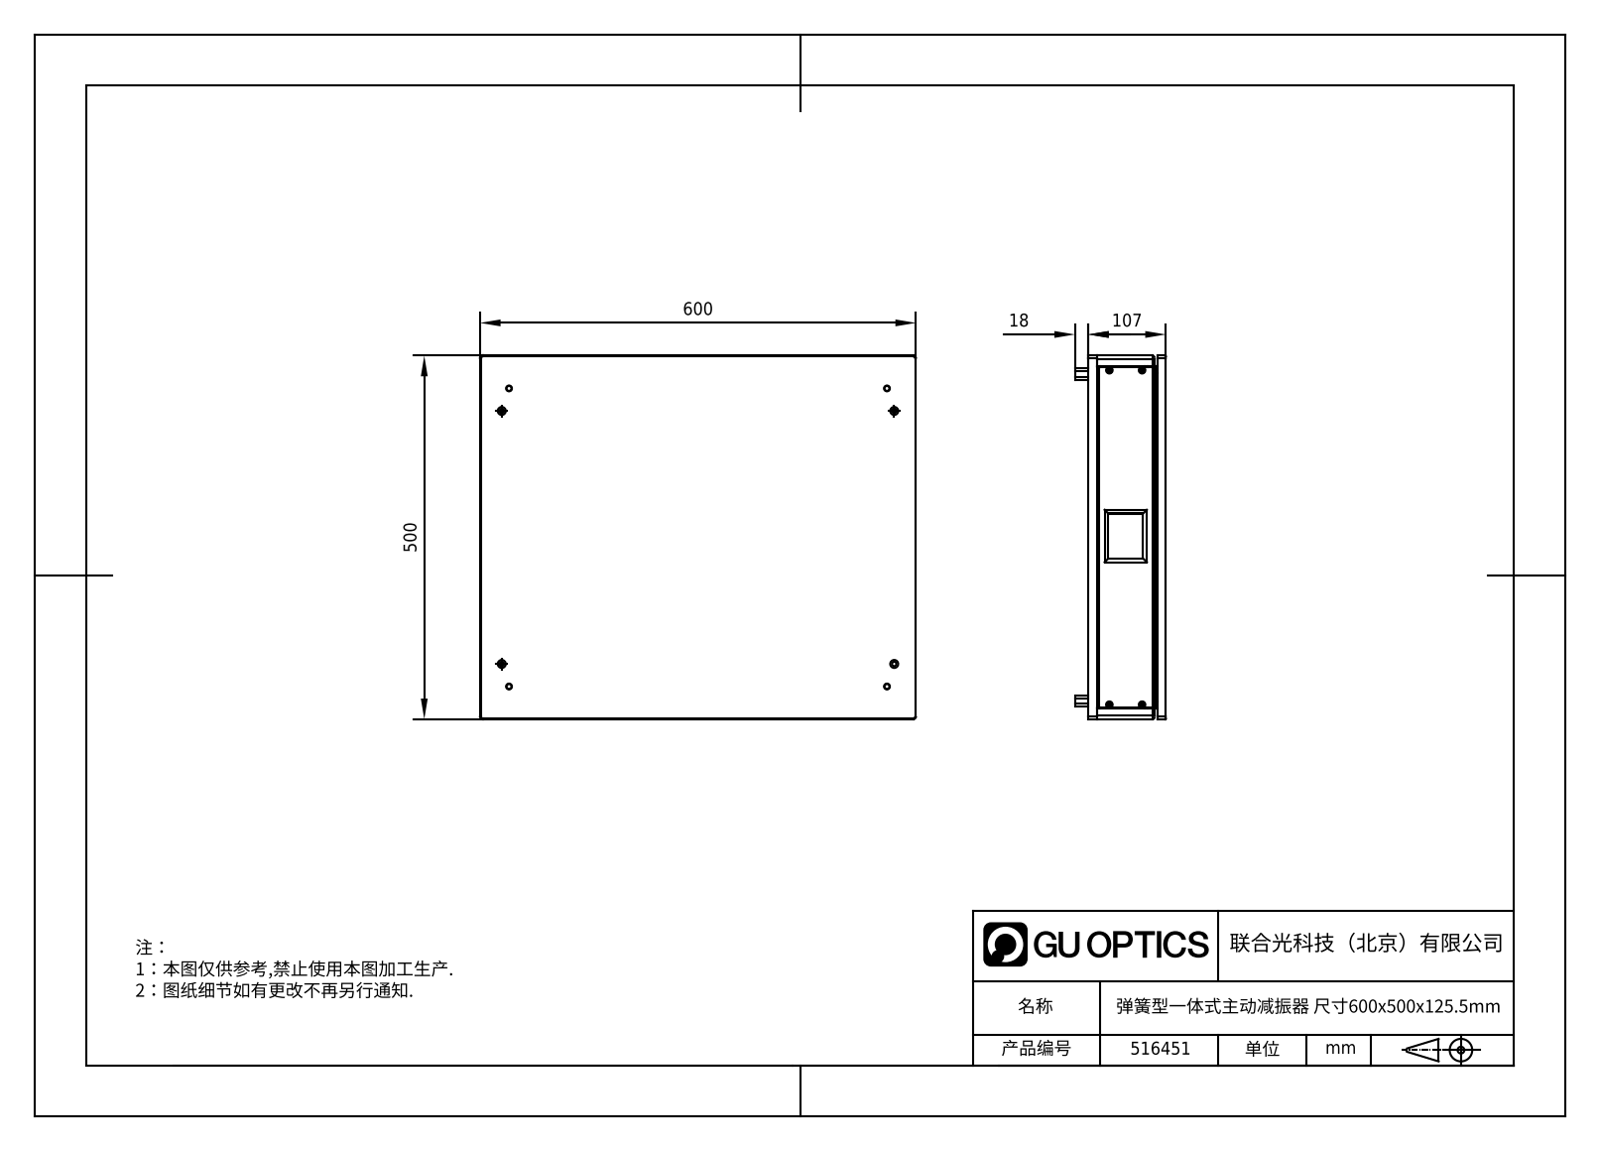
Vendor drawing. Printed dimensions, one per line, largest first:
600
500
107
18
